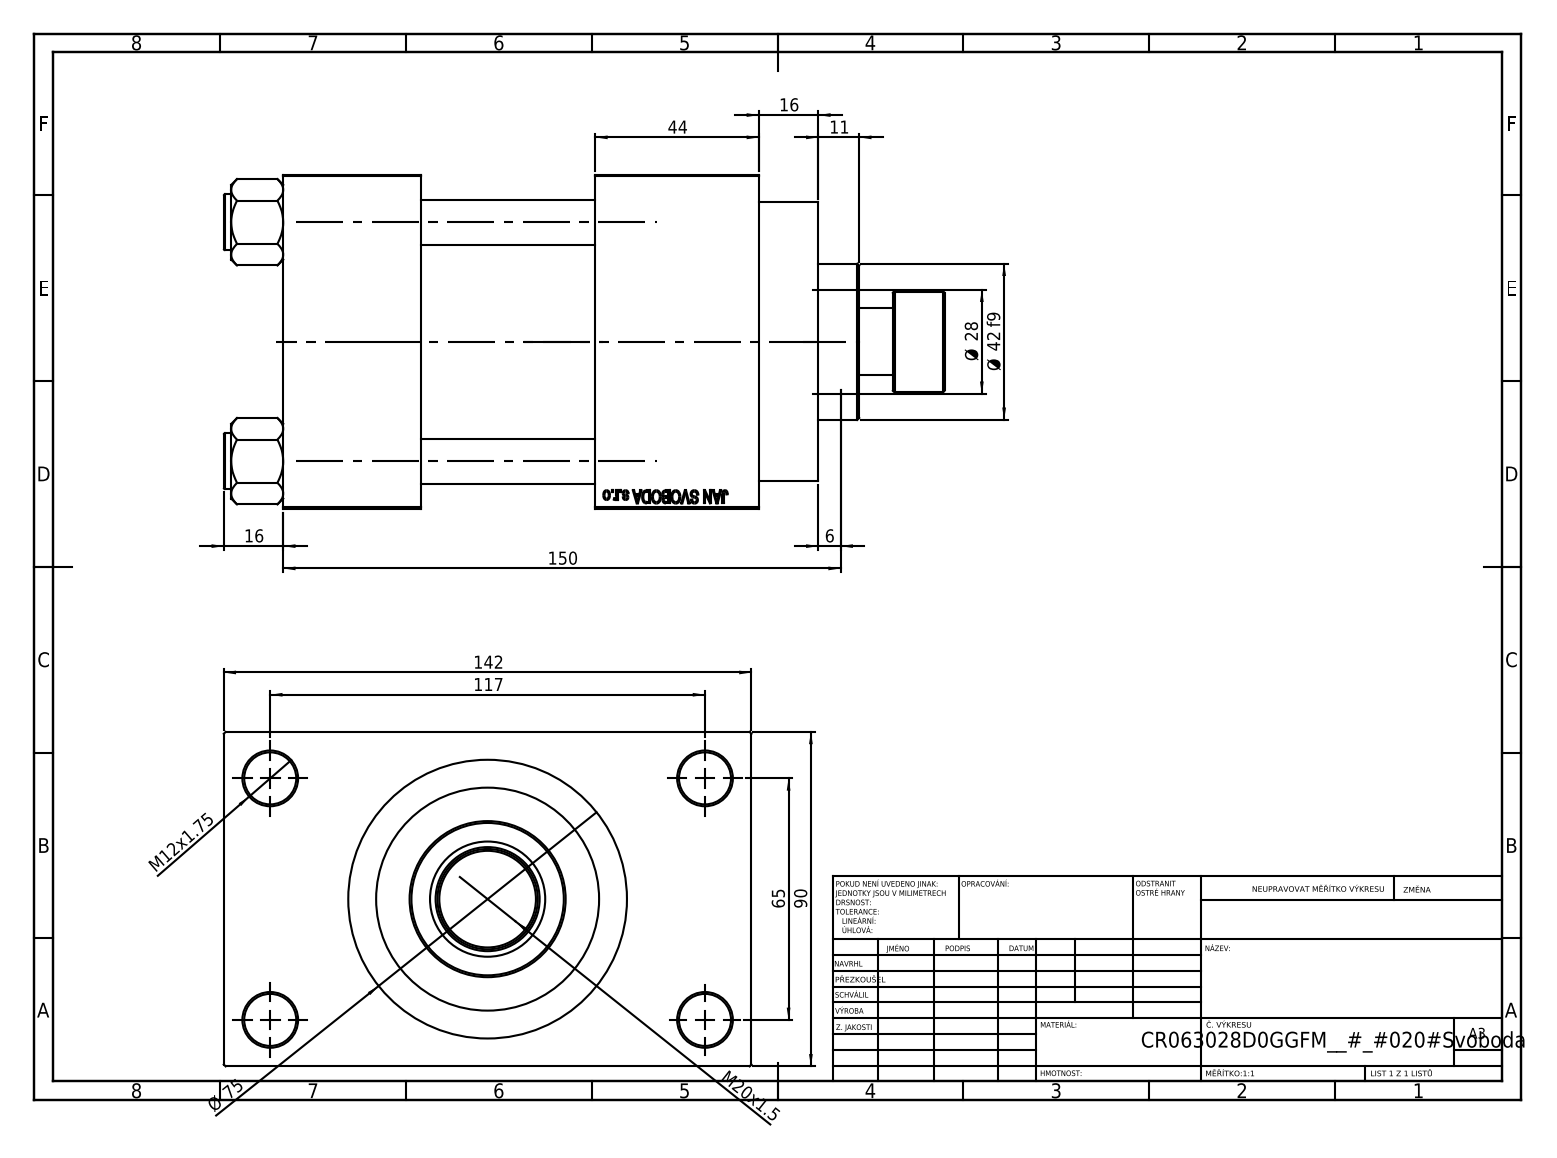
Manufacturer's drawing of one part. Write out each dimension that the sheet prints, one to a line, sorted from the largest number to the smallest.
150
142
117
90
Ø 75
65
44
Ø 42 f9
Ø 28
M20x1.5
16
16
M12x1.75
11
6
